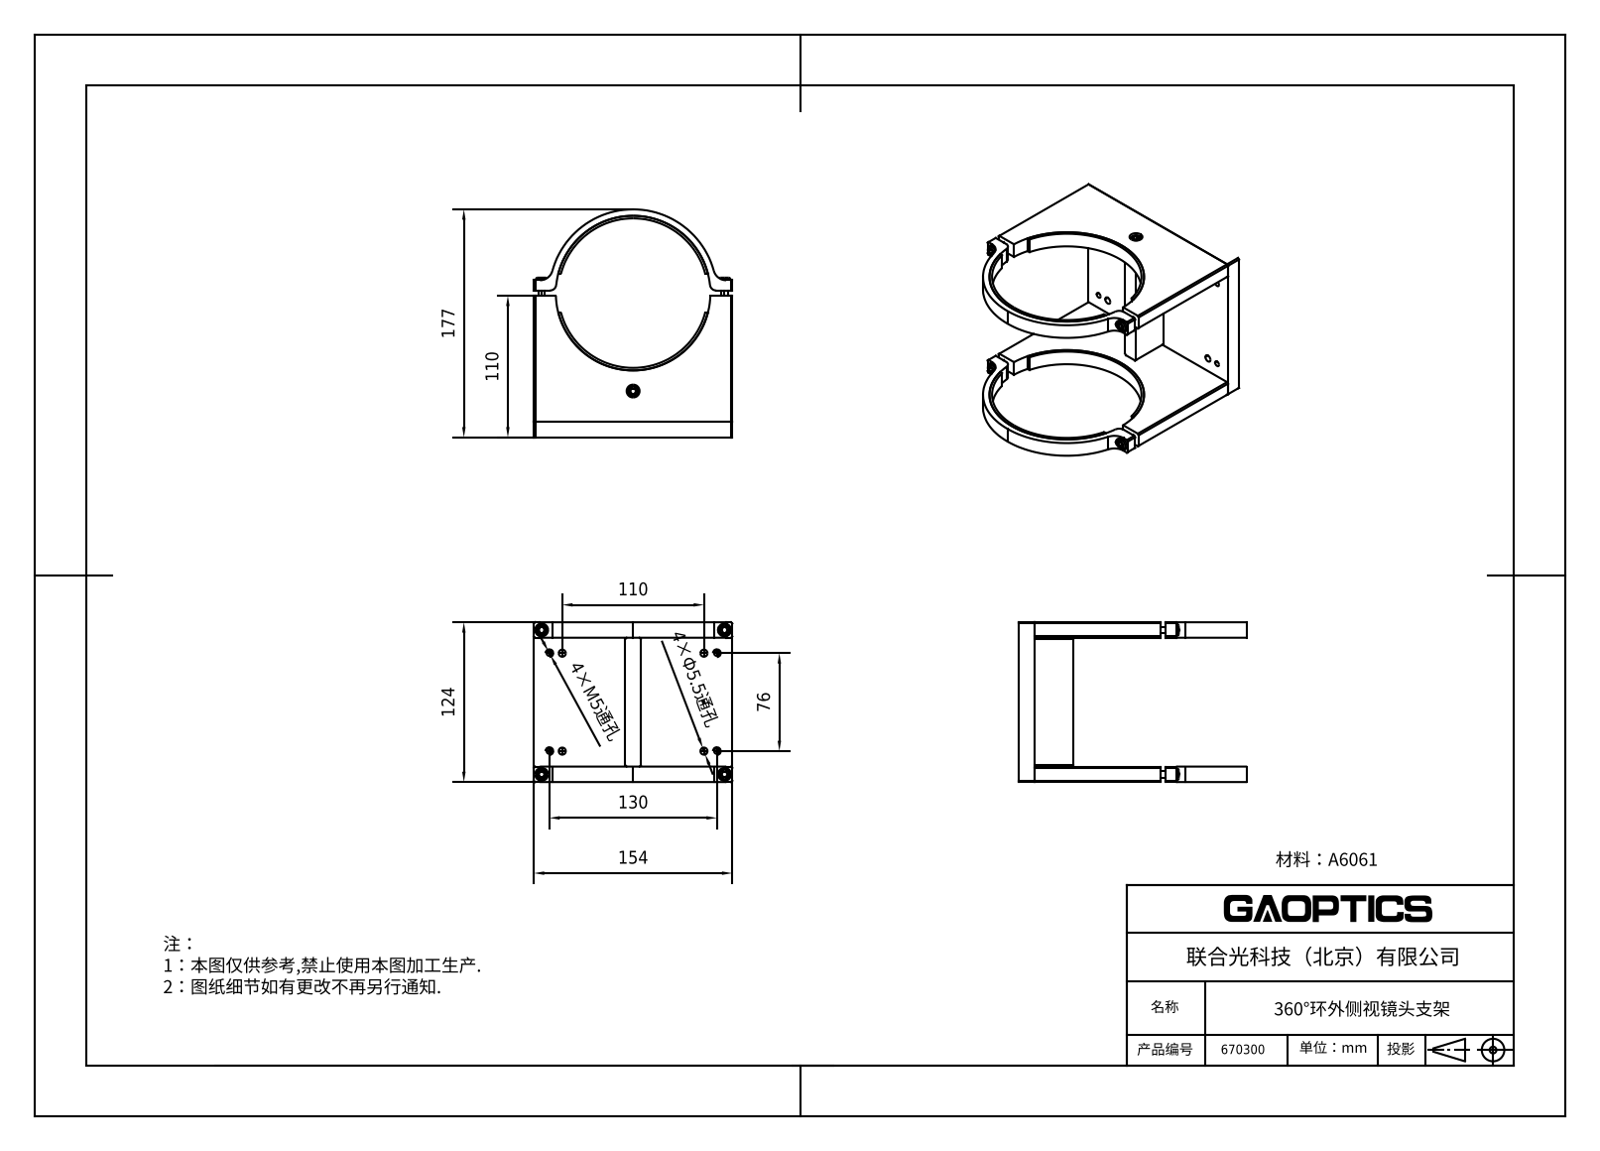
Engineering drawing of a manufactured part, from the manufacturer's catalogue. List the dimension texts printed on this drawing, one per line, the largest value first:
177
154
130
124
110
110
76
4×Φ5.5通孔
4×M5通孔
